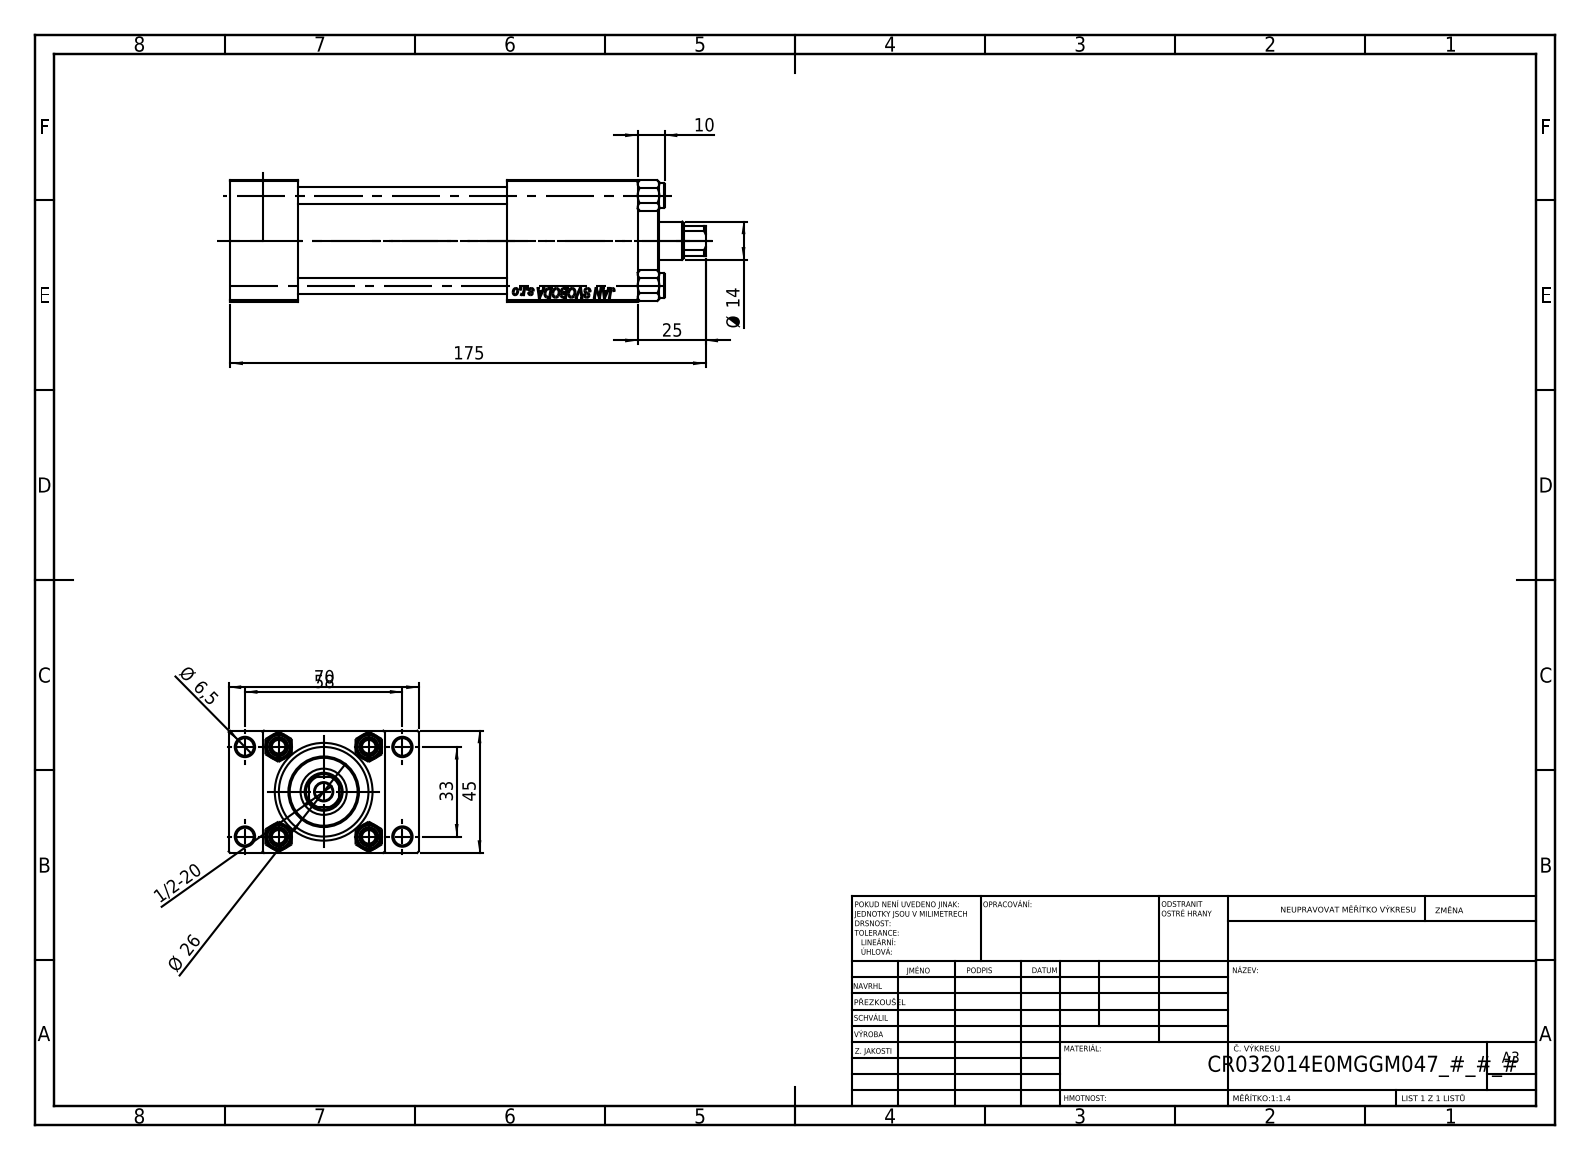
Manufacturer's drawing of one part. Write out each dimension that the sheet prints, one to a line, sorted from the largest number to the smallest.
175
70
58
45
33
Ø 26
25
Ø 14
10
Ø 6,5
1/2-20
